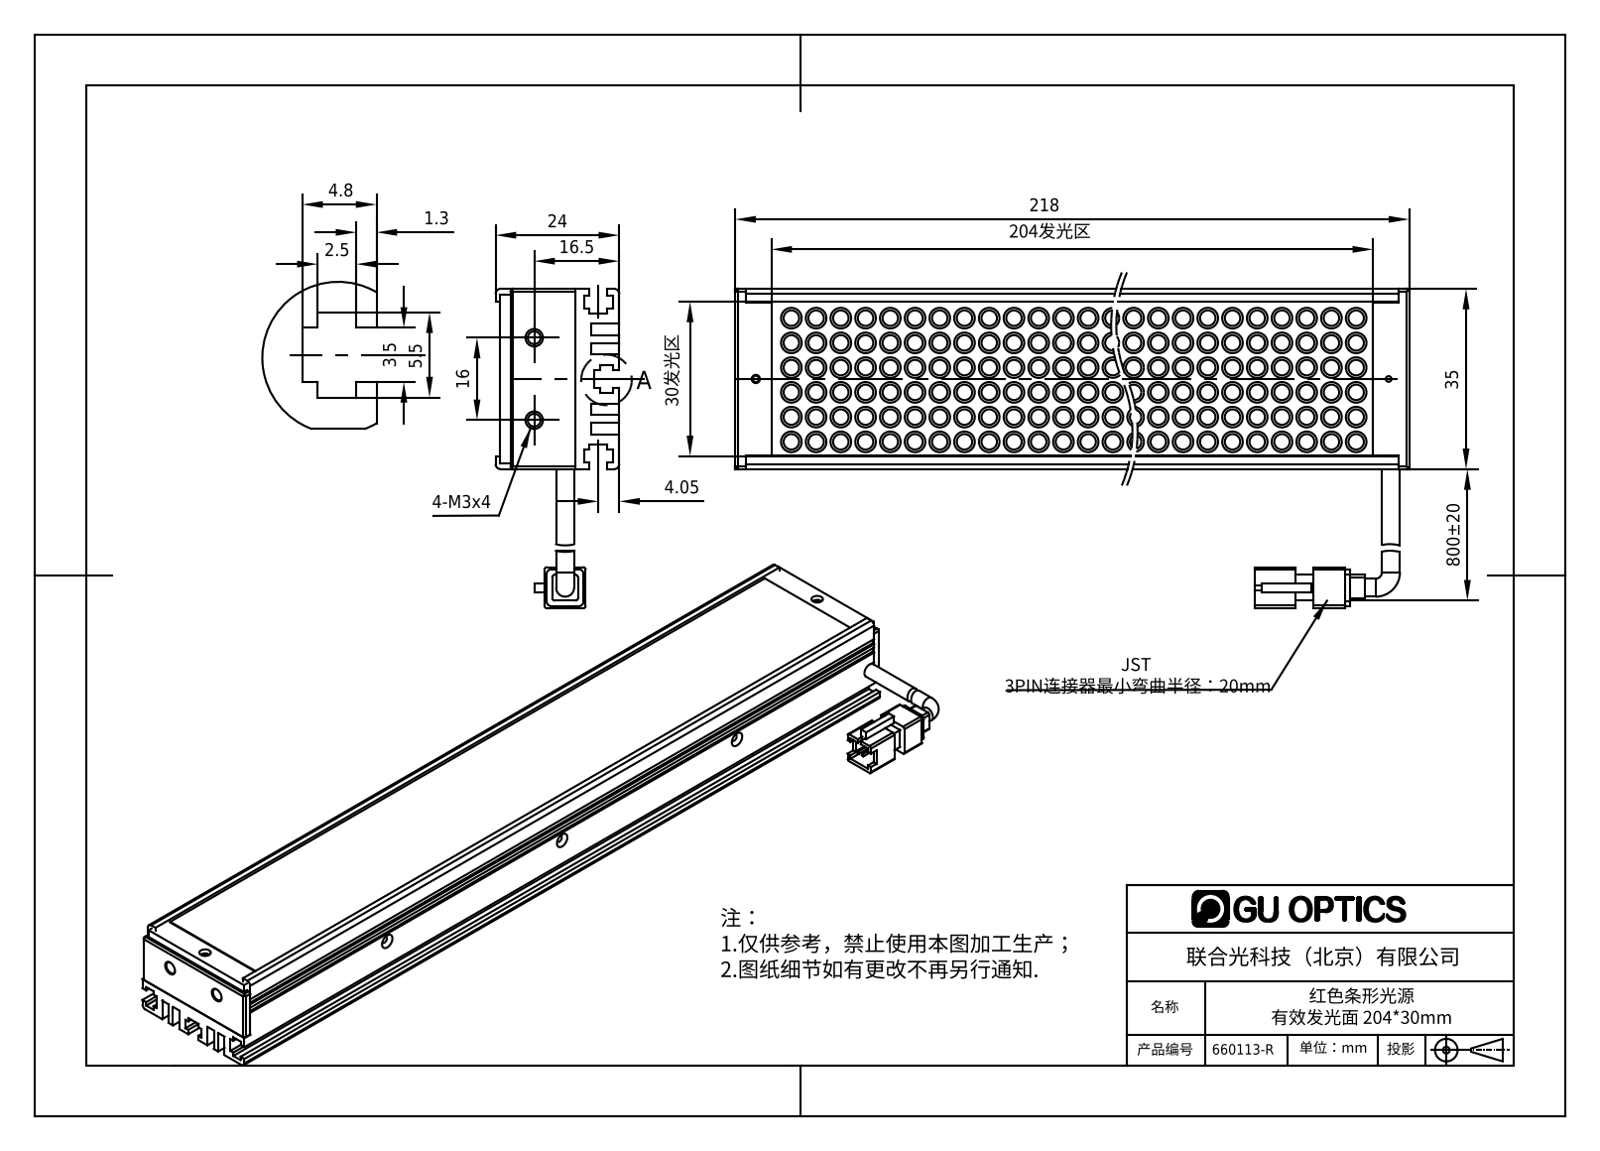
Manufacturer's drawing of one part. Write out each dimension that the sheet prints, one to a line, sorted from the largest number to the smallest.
800±20
218
204发光区
35
30发光区
24
16.5
16
5.5
4.8
4.05
3.5
2.5
1.3
